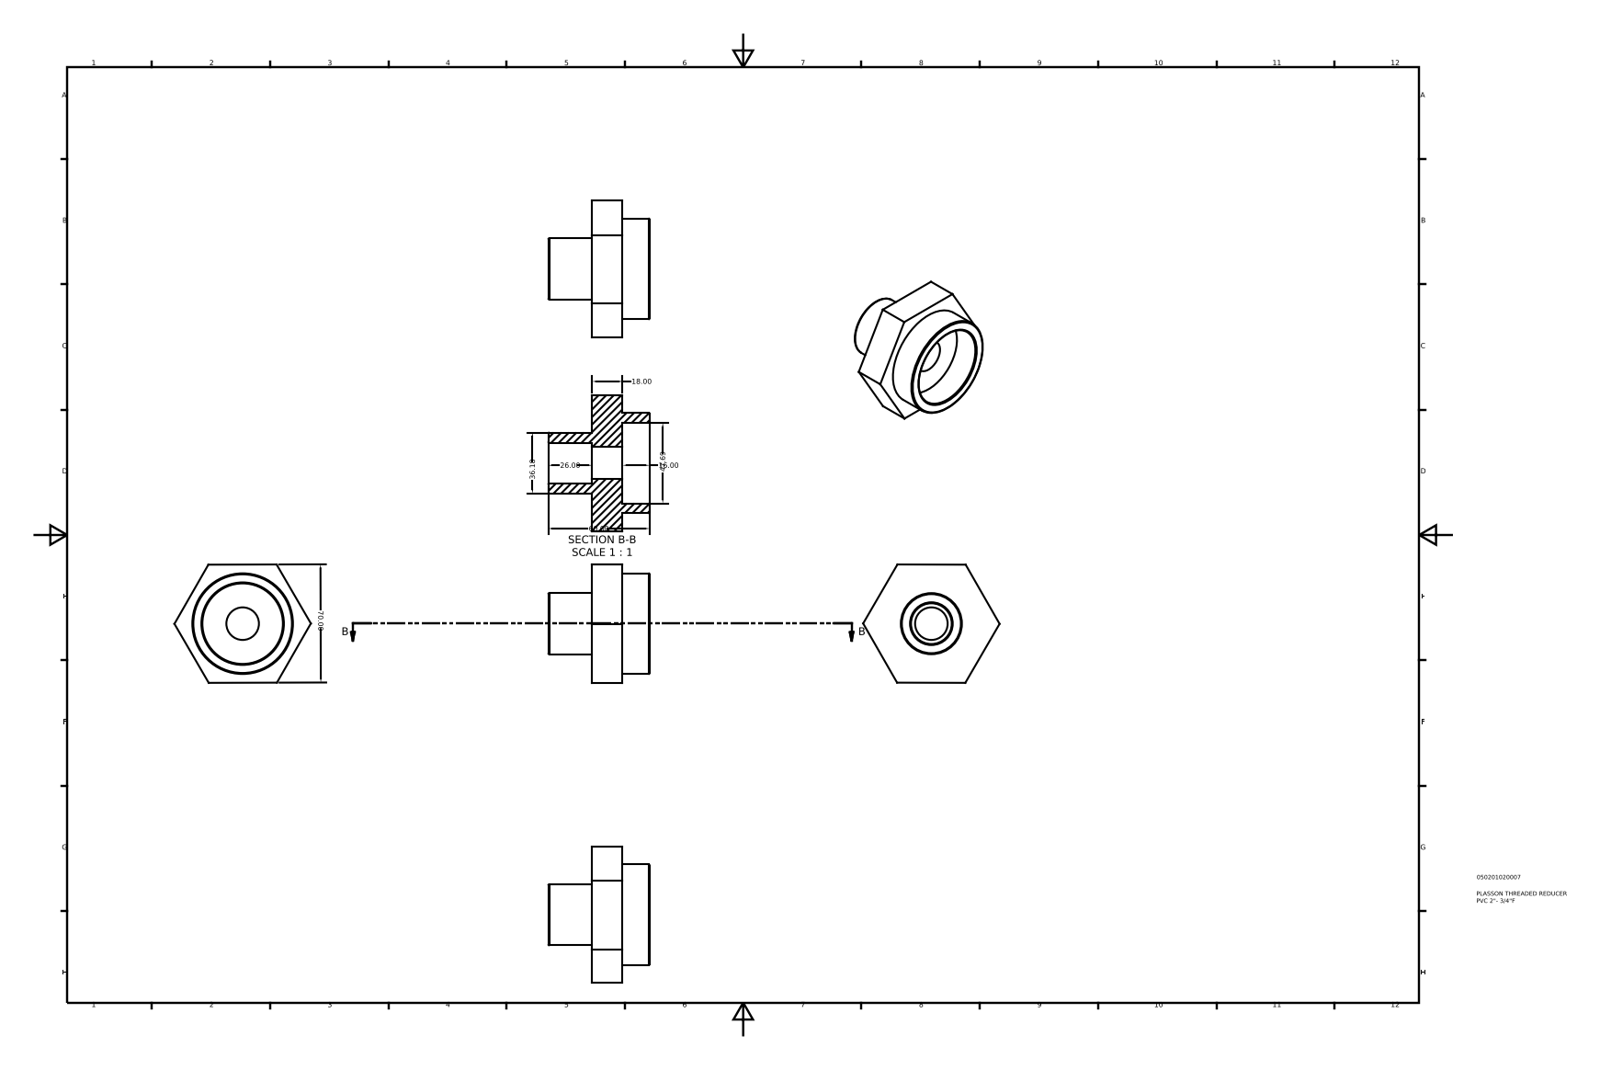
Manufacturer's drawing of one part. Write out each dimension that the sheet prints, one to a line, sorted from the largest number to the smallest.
70.00
60.00
47.69
36.18
26.00
18.00
16.00
